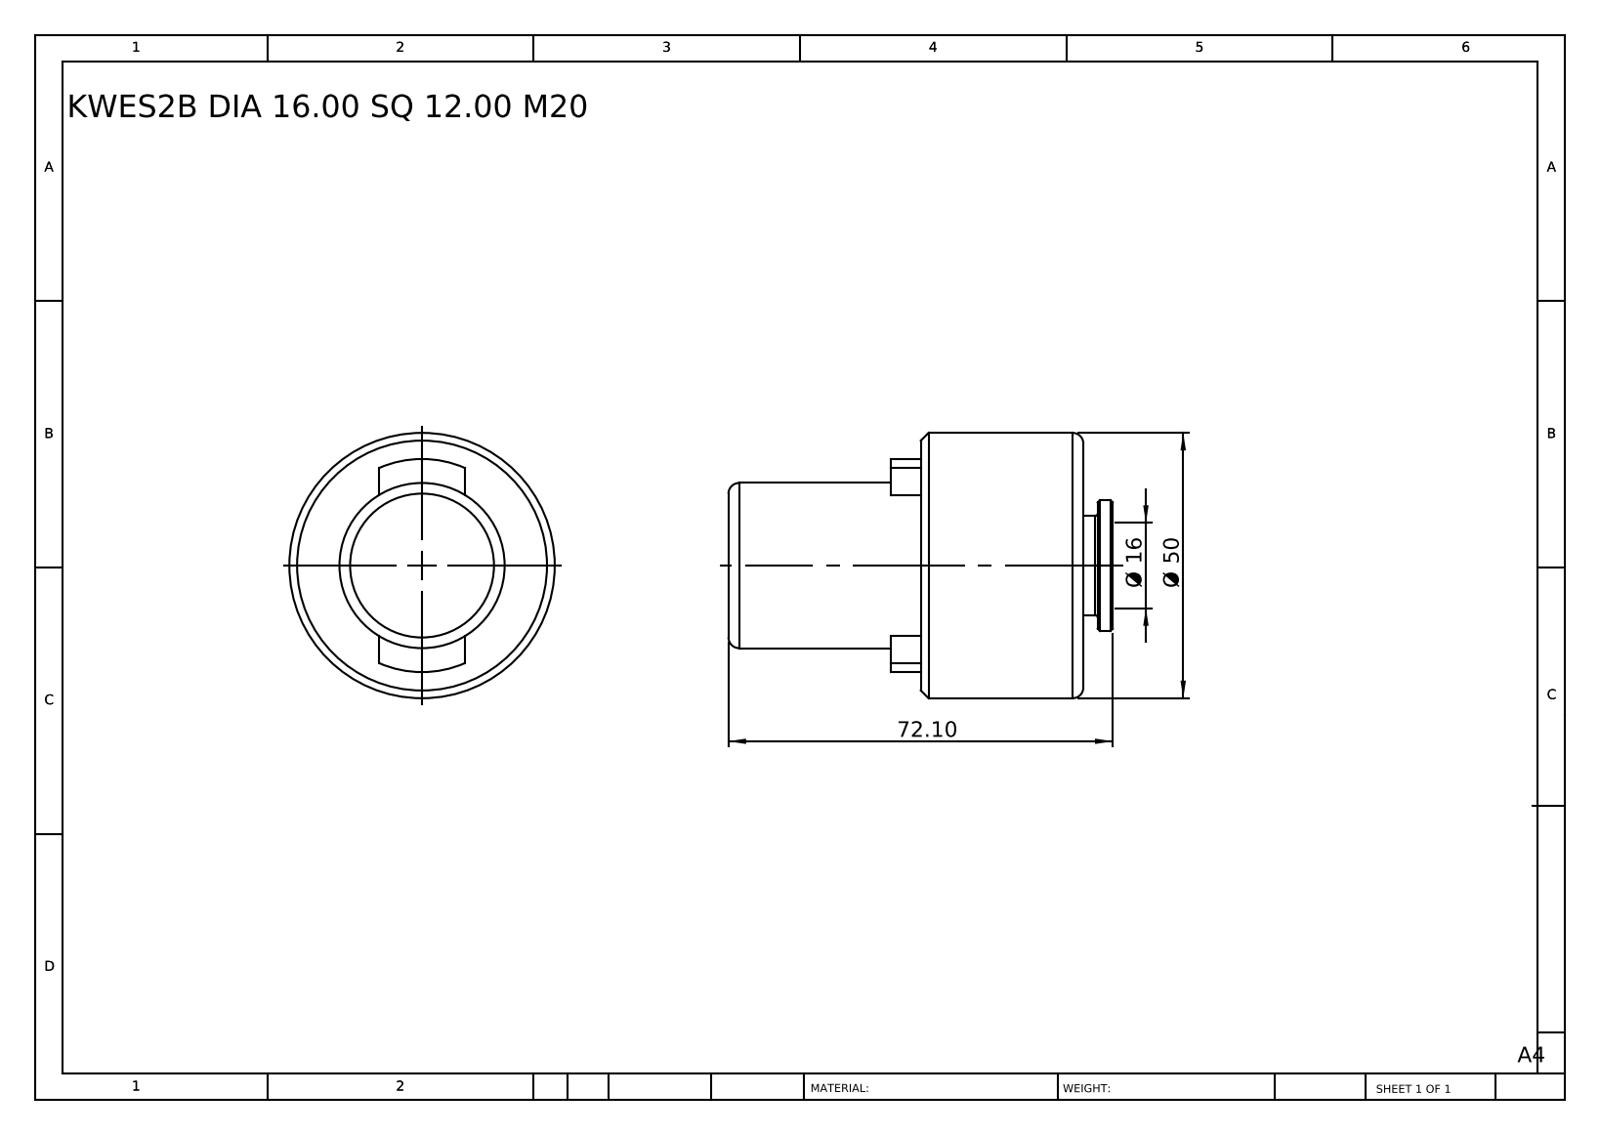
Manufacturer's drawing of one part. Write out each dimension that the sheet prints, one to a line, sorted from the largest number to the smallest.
72.10
Ø 50
Ø 16
